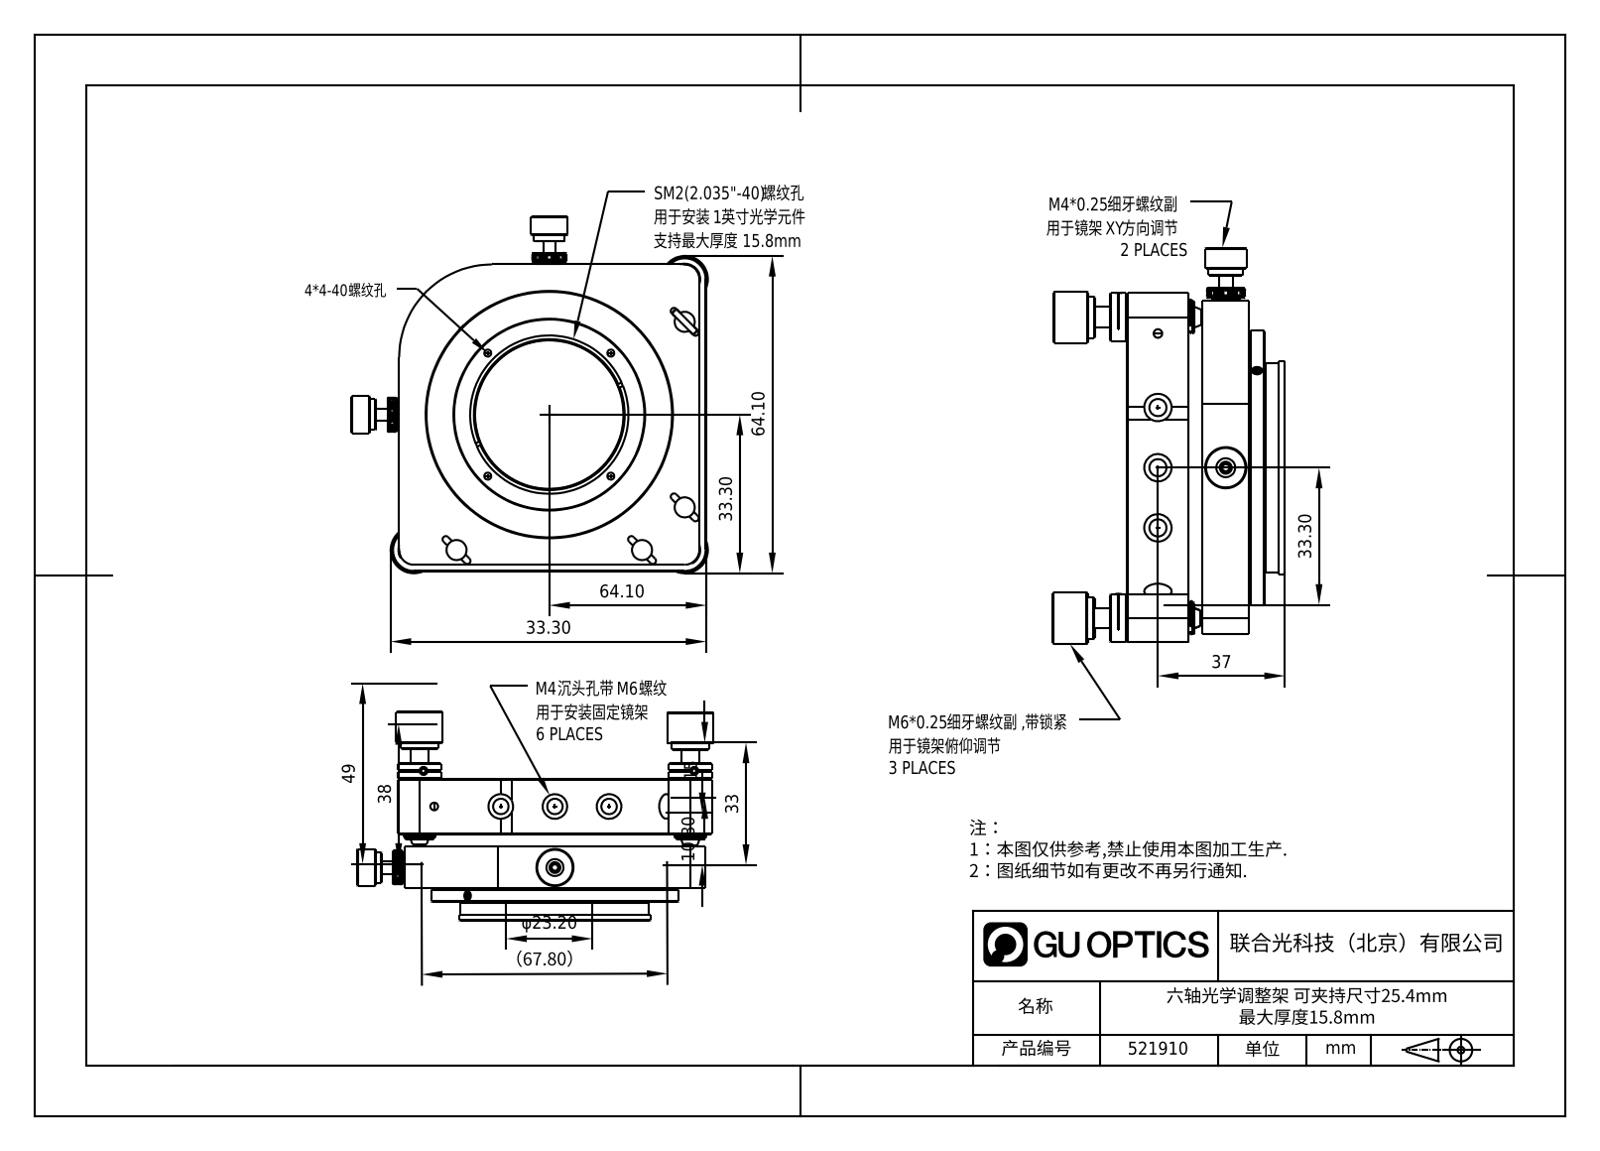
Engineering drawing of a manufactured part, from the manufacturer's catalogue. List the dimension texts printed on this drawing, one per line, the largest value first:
（67.80）
64.10
64.10
49
38
37
33.30
33.30
33.30
33
φ23.20
15
10.80
